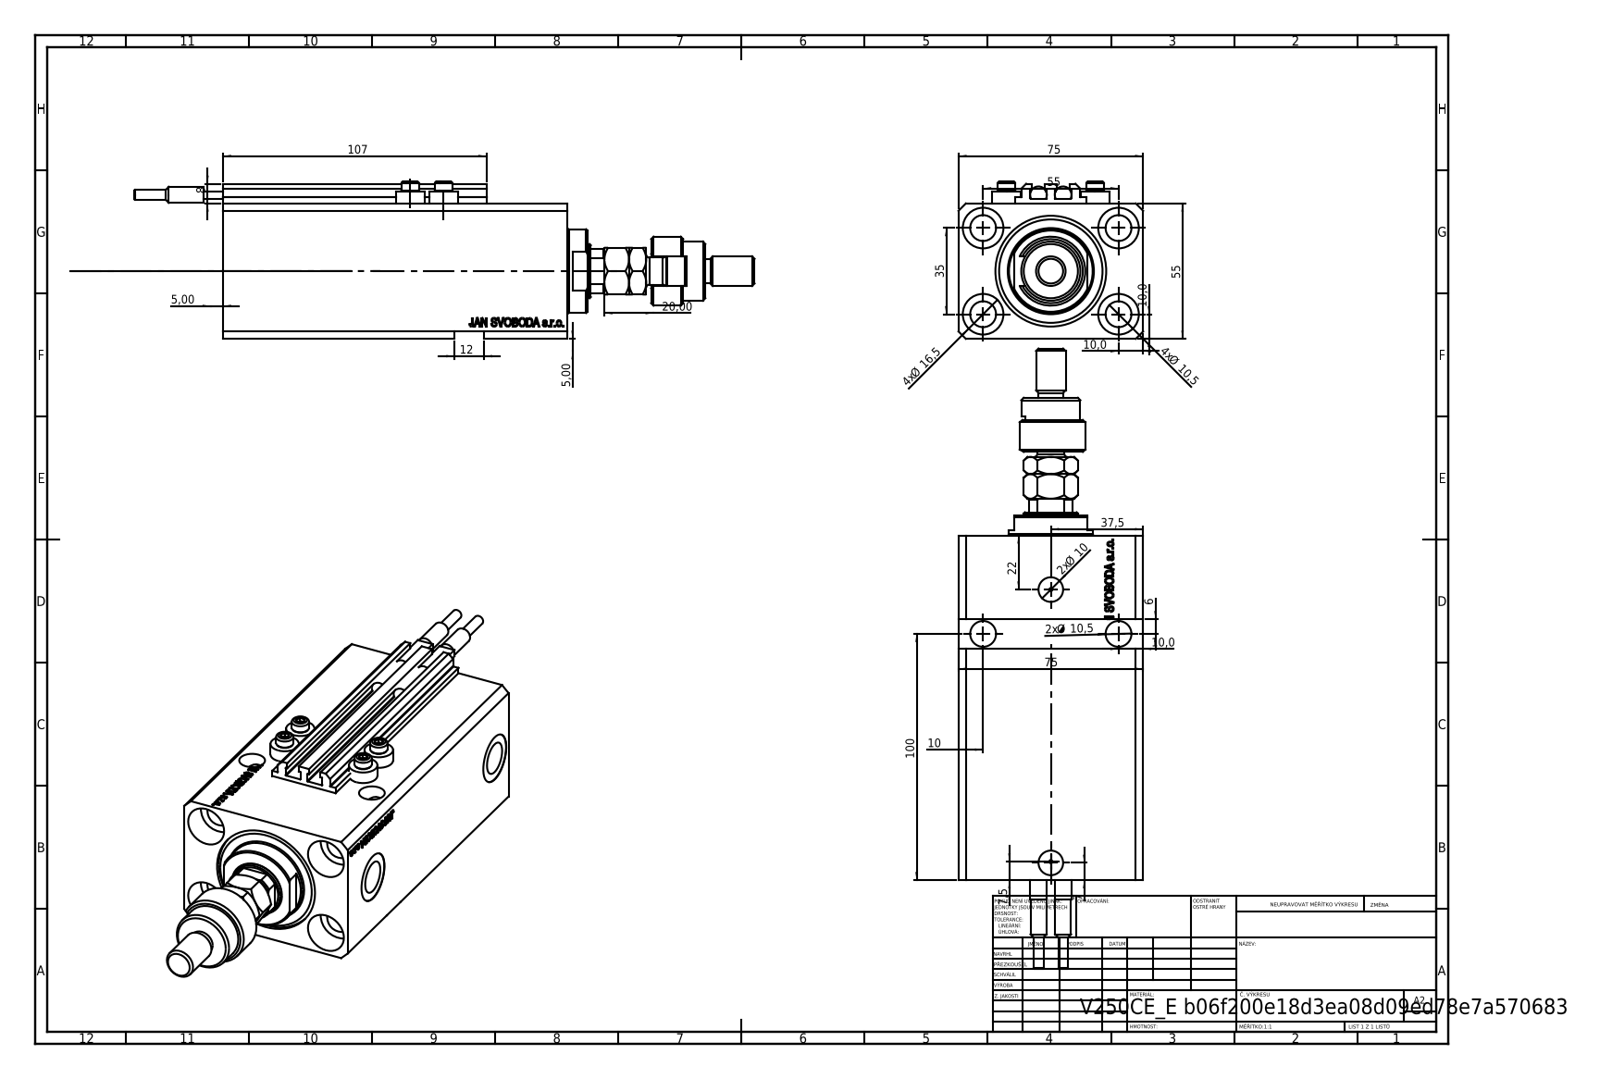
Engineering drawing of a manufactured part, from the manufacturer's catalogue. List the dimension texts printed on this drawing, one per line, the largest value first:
107
100
75
75
55
55
37,5
35
22
20,00
4x Ø 16,5
12
4x Ø 10,5
2x Ø 10,5
10,0
10,0
2x Ø 10
10,0
10
8
7,5
7
6
5,00
5,00
